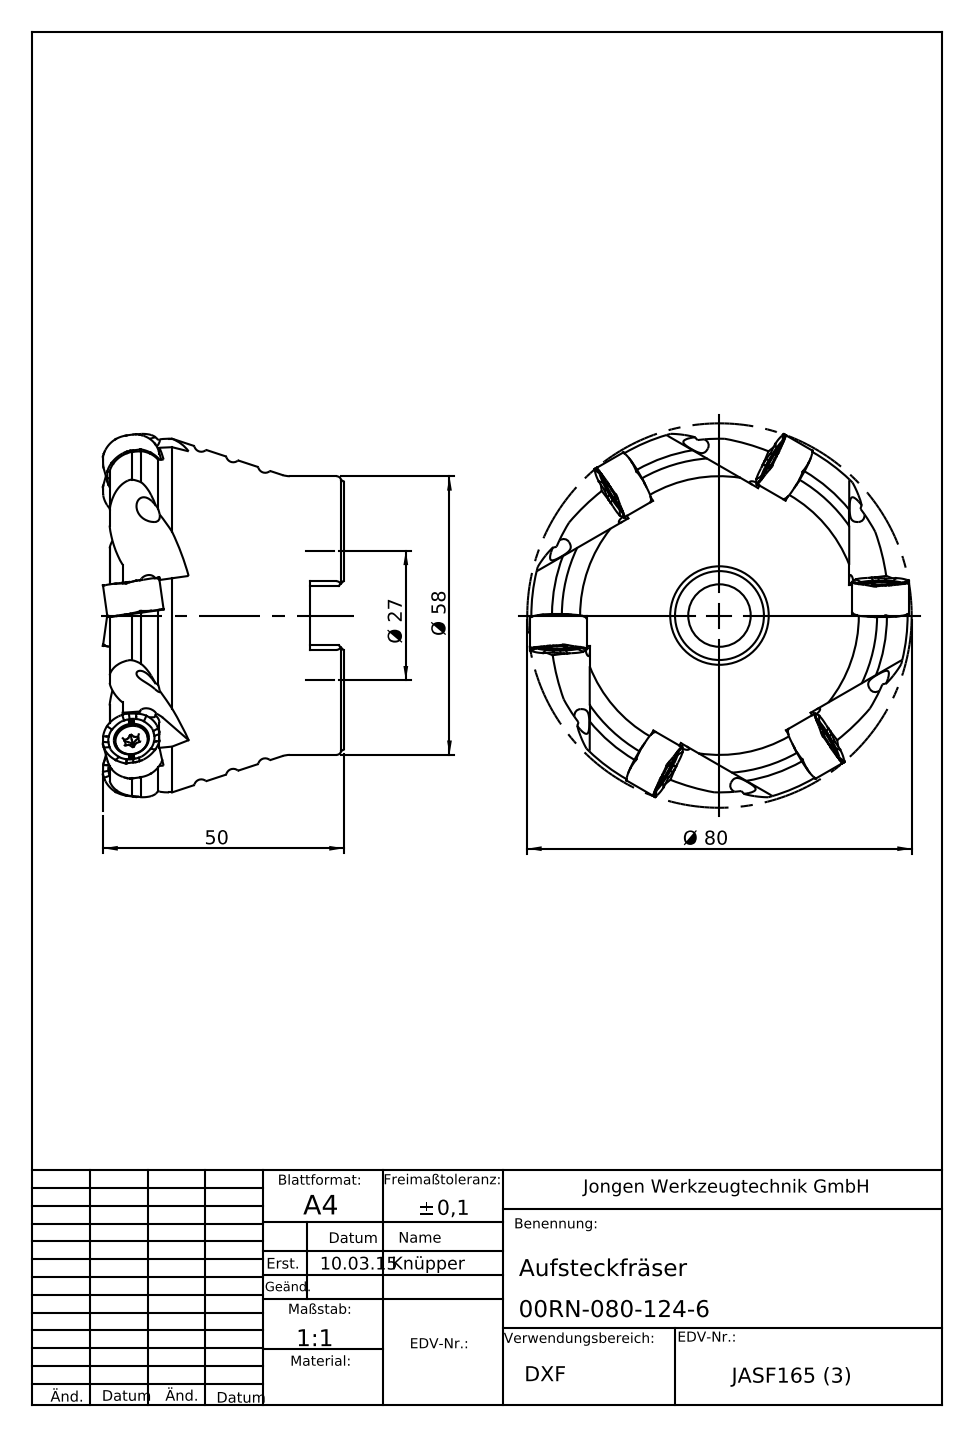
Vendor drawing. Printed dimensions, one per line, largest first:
Ø 80
Ø 58
50
Ø 27
